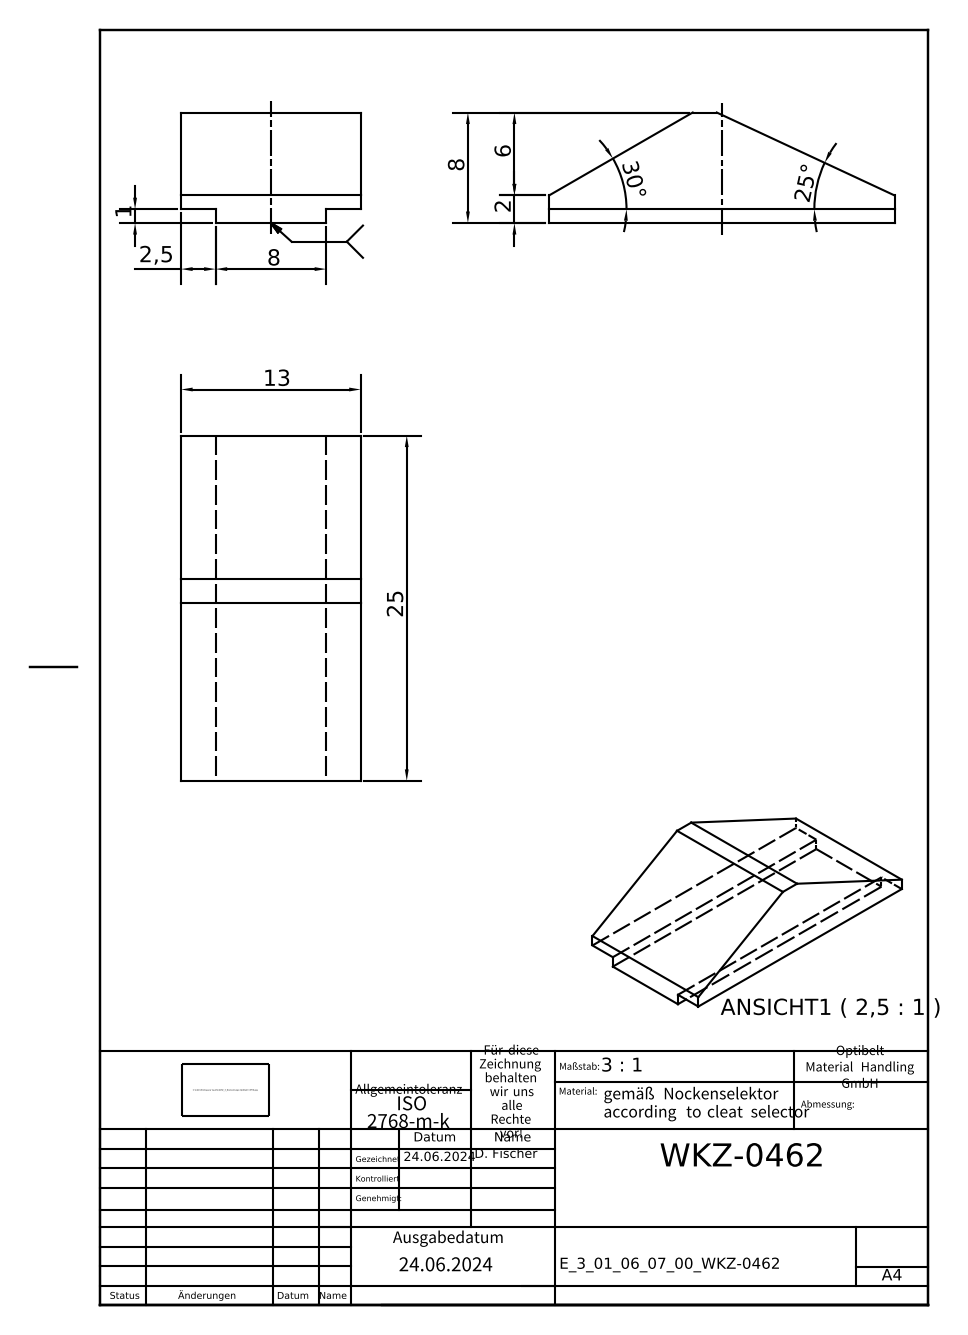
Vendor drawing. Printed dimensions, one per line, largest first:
30°
25
25°
13
8
8
6
2,5
2
1
